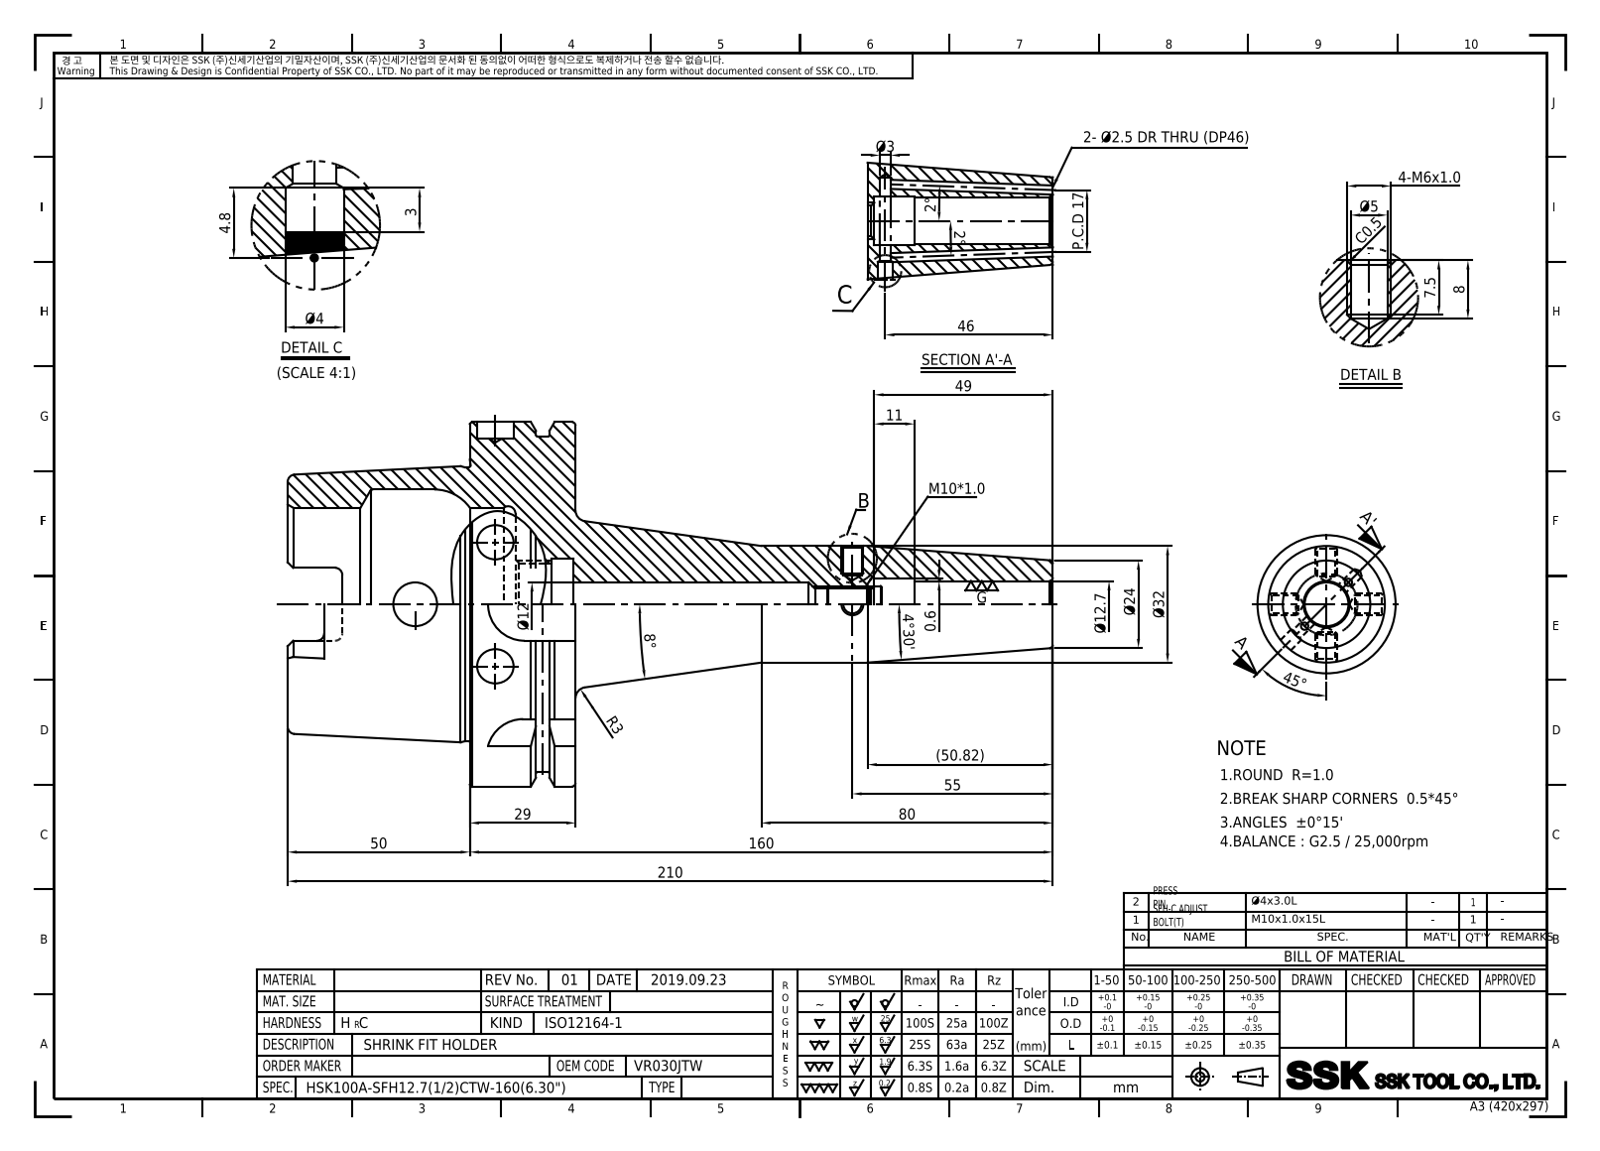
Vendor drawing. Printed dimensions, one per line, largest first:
210
160
80
55
(50.82)
50
49
46
45°
Ø32
29
Ø24
P.C.D 17
Ø12.7
Ø12
11
8°
8
7.5
4-M6x1.0
Ø5
4.8
Ø4
4°30'
R3
Ø3
3
2°
2°
0.6
C0.5
